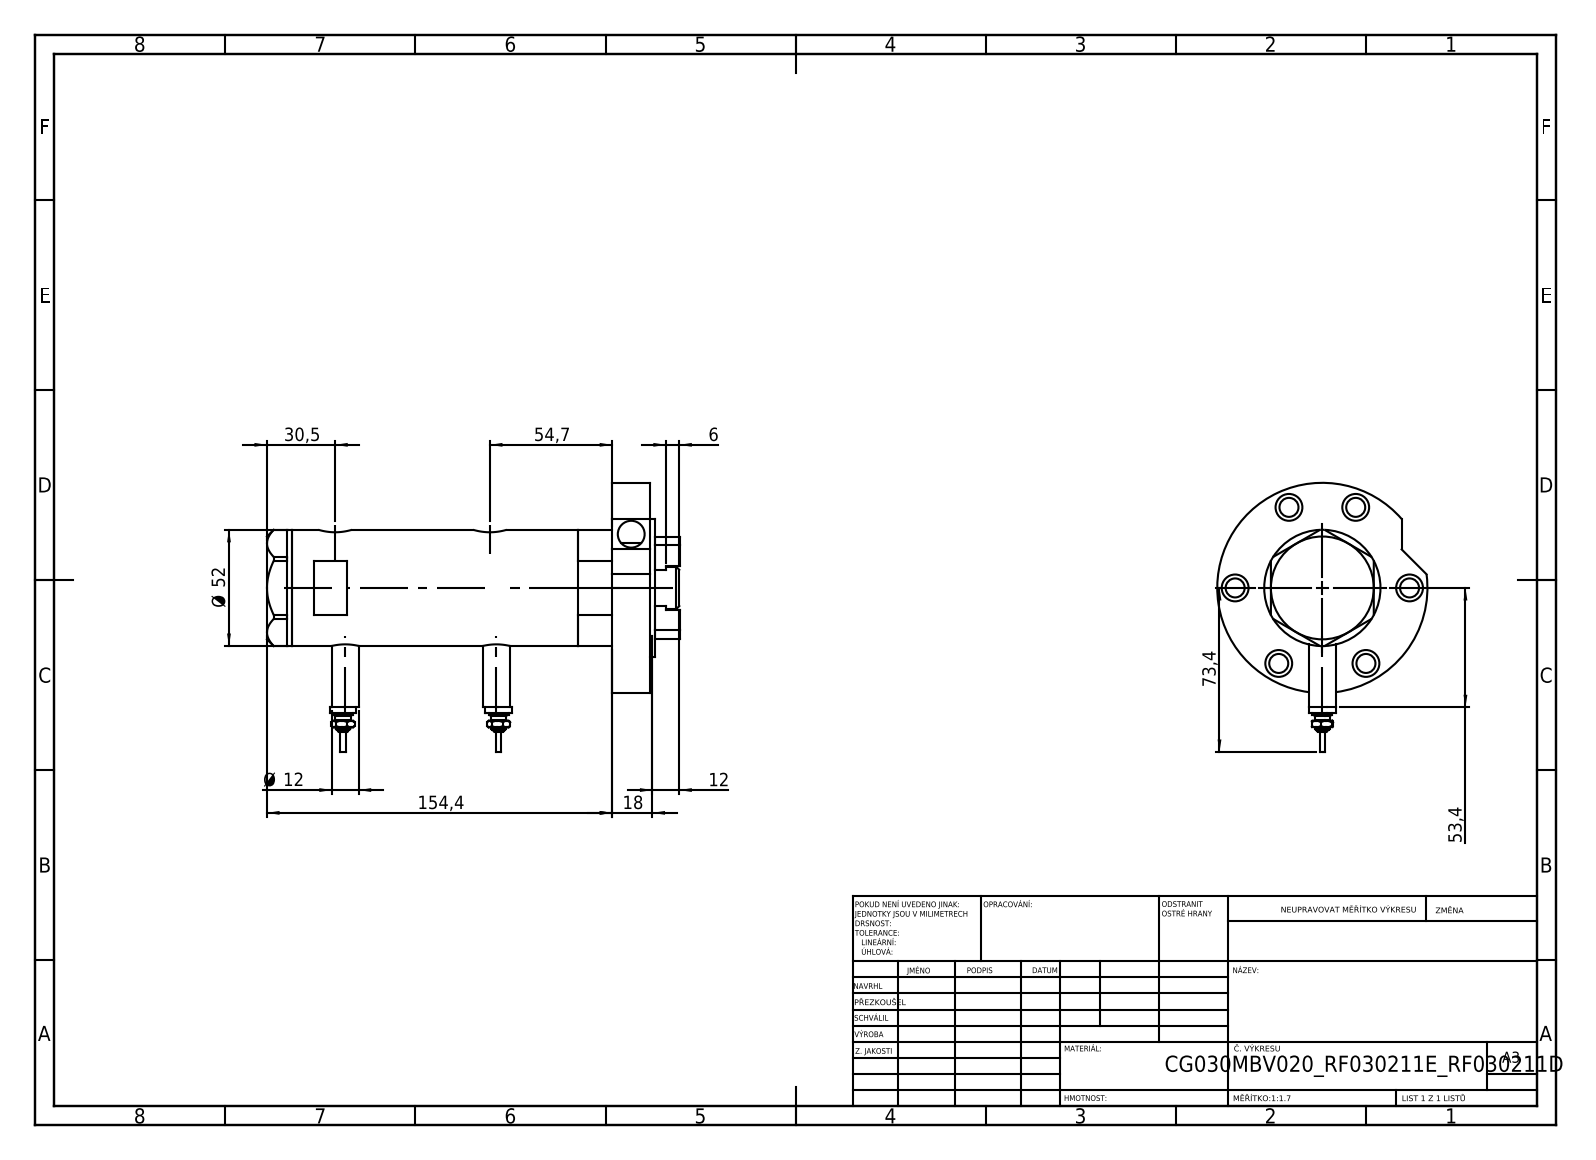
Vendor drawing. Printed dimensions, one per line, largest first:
154,4
73,4
54,7
53,4
Ø 52
30,5
18
12
Ø 12
6
